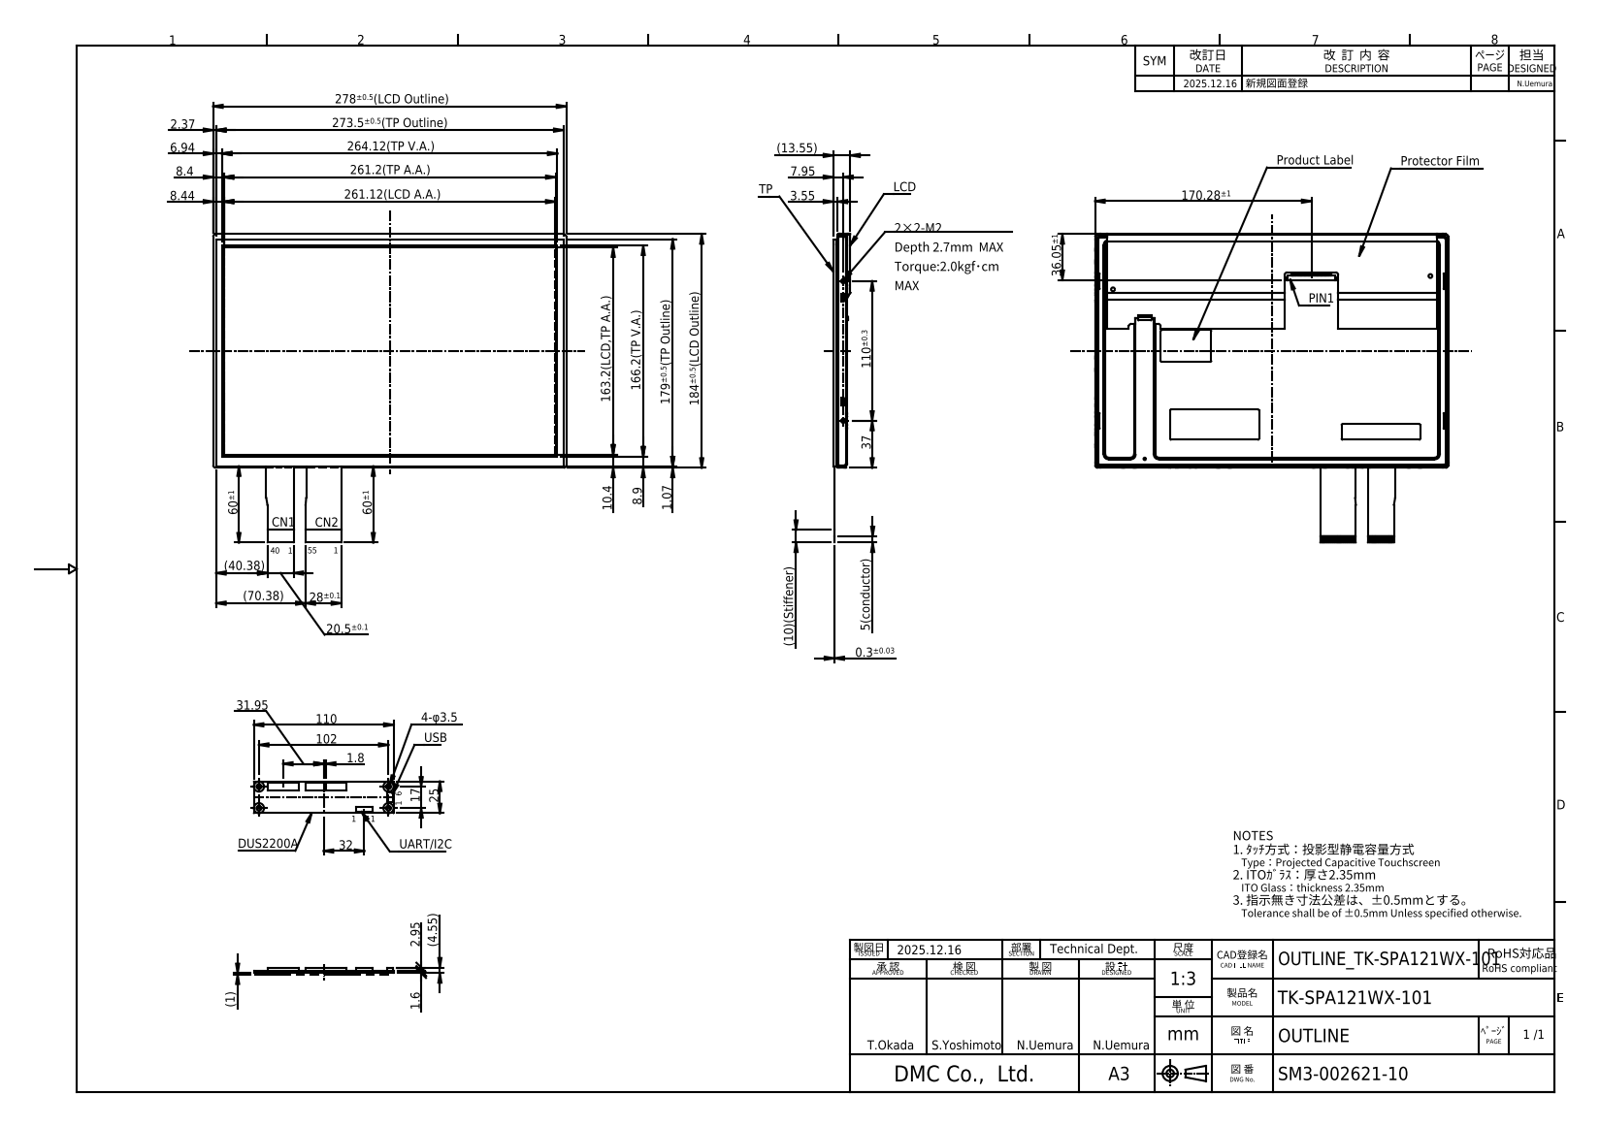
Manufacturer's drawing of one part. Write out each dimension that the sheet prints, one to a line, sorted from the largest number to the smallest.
278±0.5(LCD Outline)
273.5±0.5(TP Outline)
264.12(TP V.A.)
261.2(TP A.A.)
261.12(LCD A.A.)
184±0.5(LCD Outline)
179±0.5(TP Outline)
170.28±1
166.2(TP V.A.)
163.2(LCD,TP A.A.)
110±0.3
110
102
(70.38)
60±1
60±1
(40.38)
37
36.05±1
32
31.95
28±0.1
25
20.5±0.1
17
(13.55)
10.4
(10)(Stiffener)
8.9
8.44
8.4
7.95
6.94
5(conductor)
(4.55)
3.55
2.95
2.37
1.8
1.6
1.07
(1)
0.3±0.03
